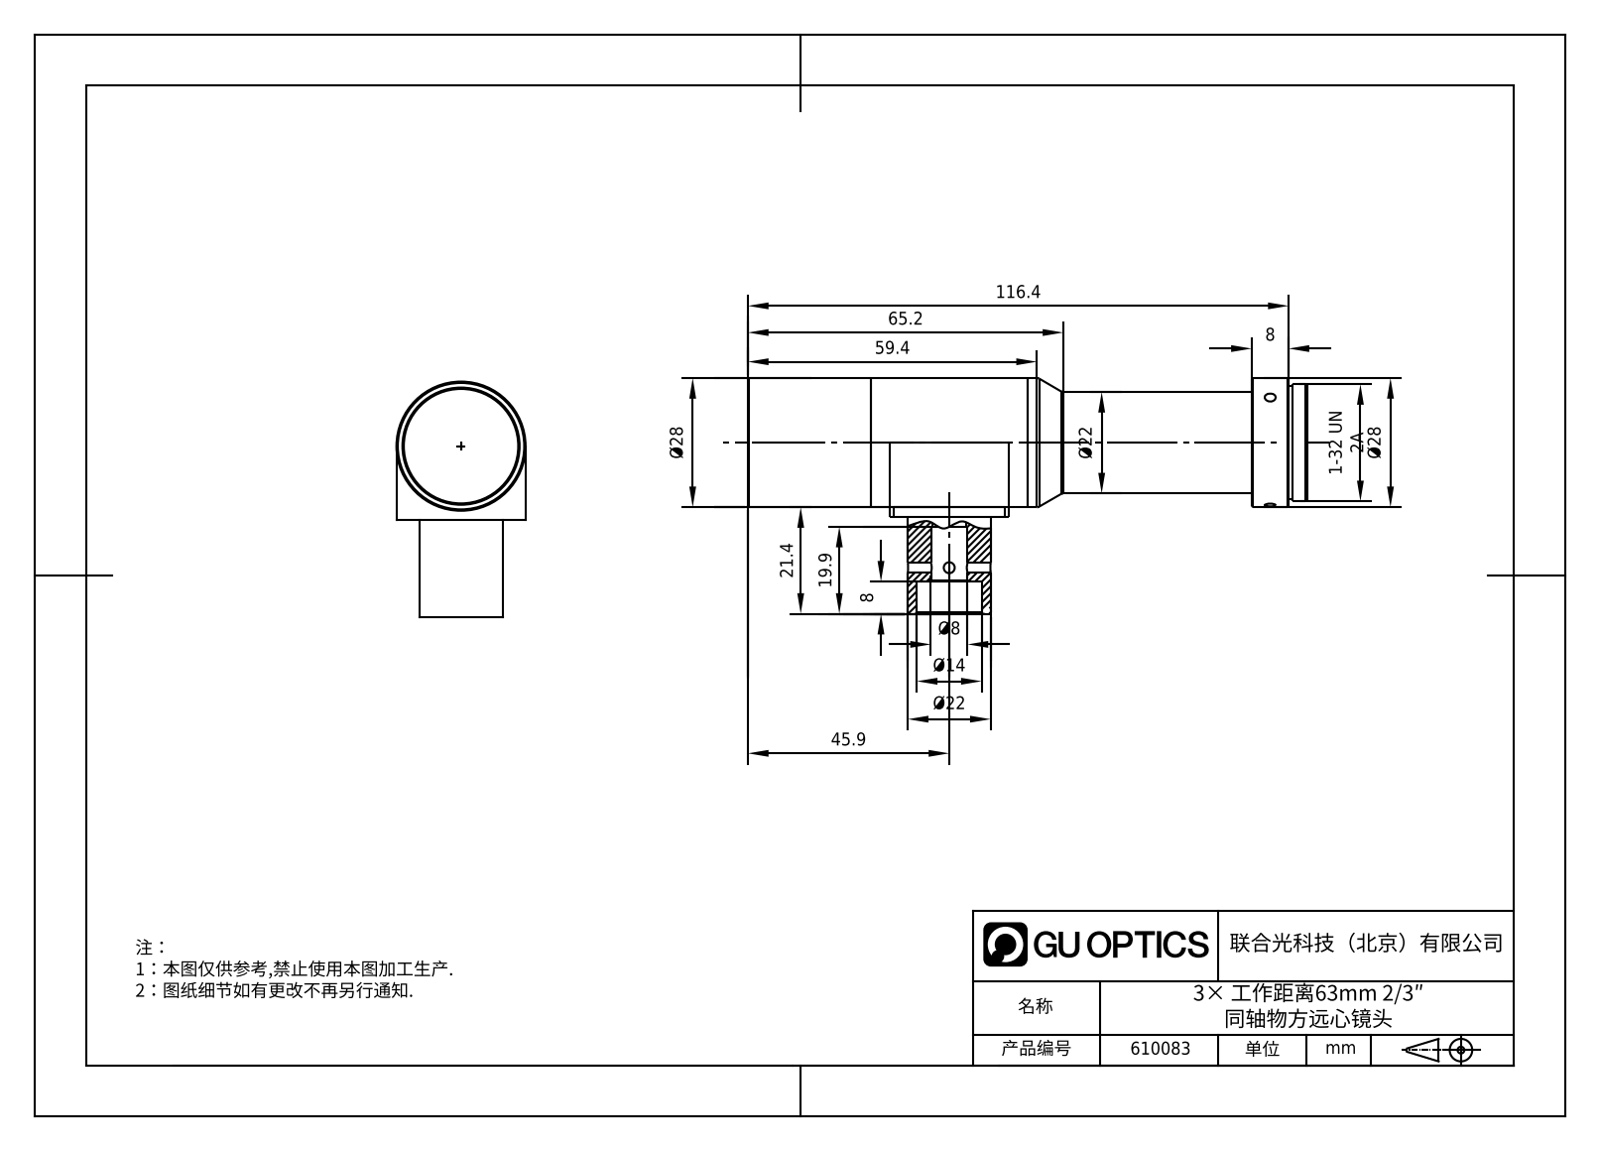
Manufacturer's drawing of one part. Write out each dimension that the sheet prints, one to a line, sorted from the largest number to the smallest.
116.4
65.2
59.4
45.9
Ø28
Ø28
Ø22
Ø22
21.4
19.9
Ø14
8
Ø8
8
1-32 UN 2A
